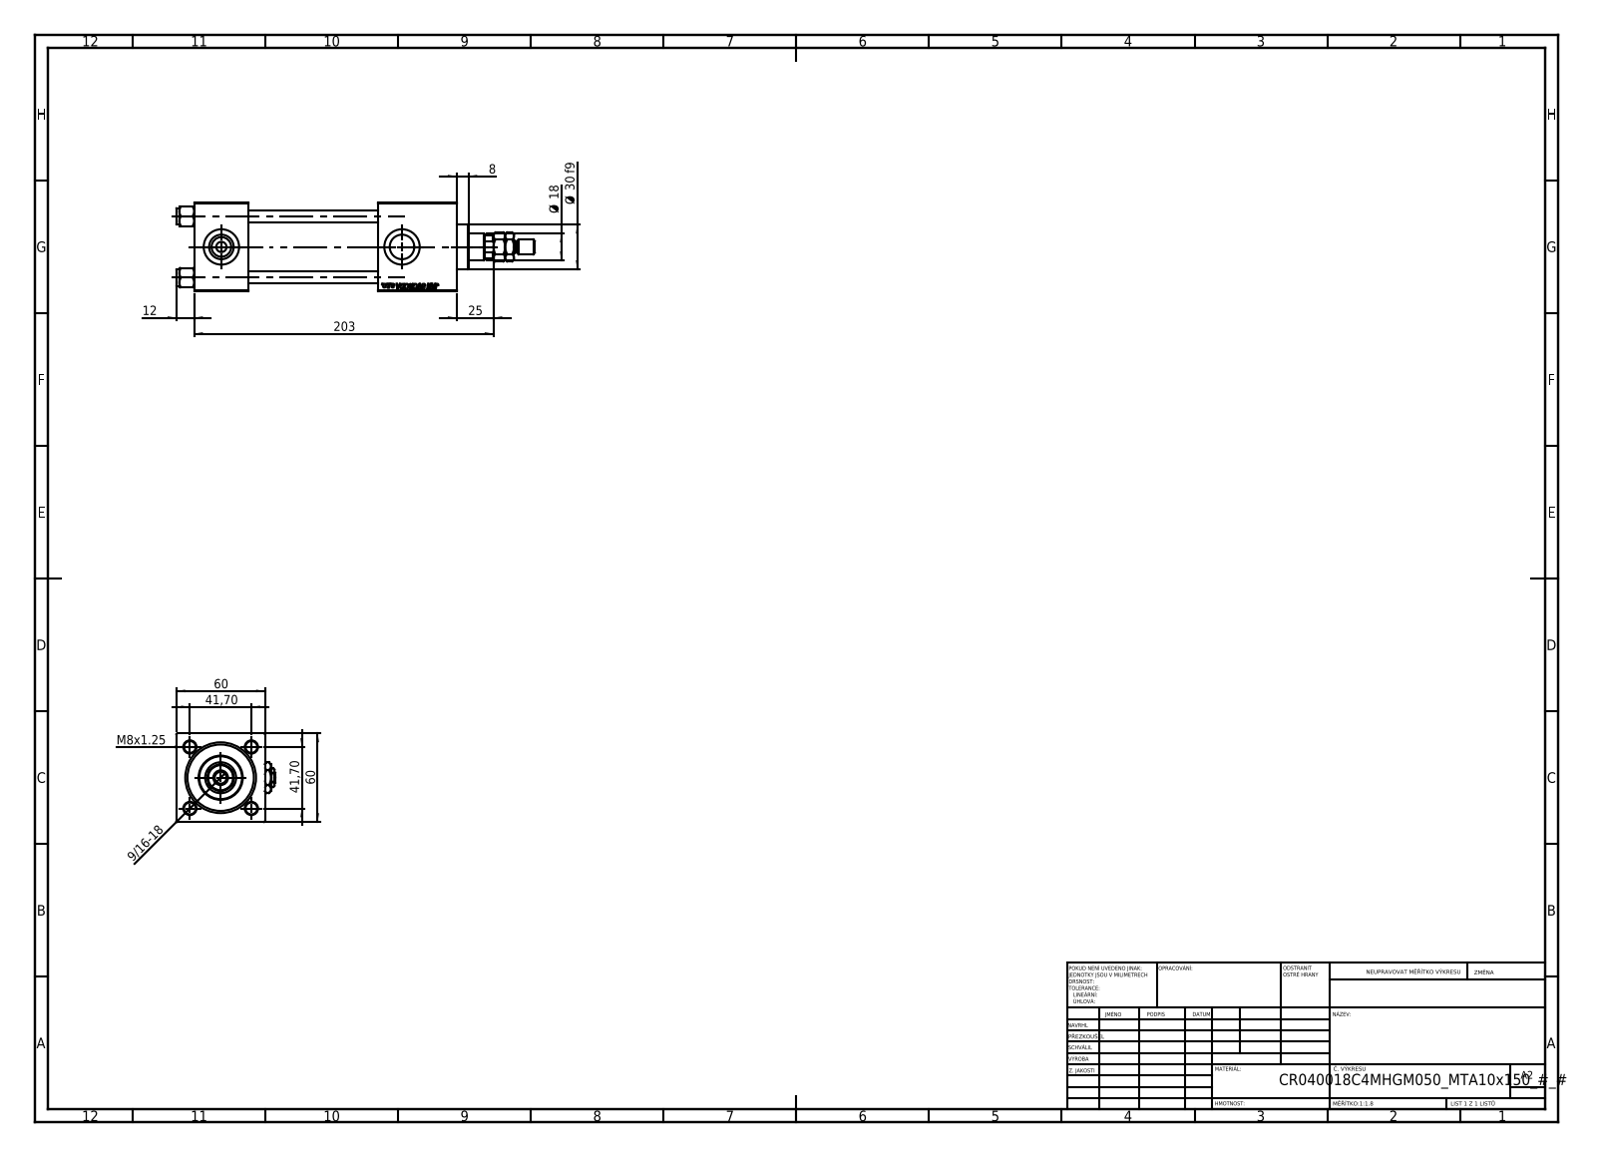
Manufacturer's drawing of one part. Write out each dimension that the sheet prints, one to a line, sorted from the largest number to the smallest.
203
60
60
41,70
41,70
Ø 30 f9
25
Ø 18
12
8
M8x1.25
9/16-18
